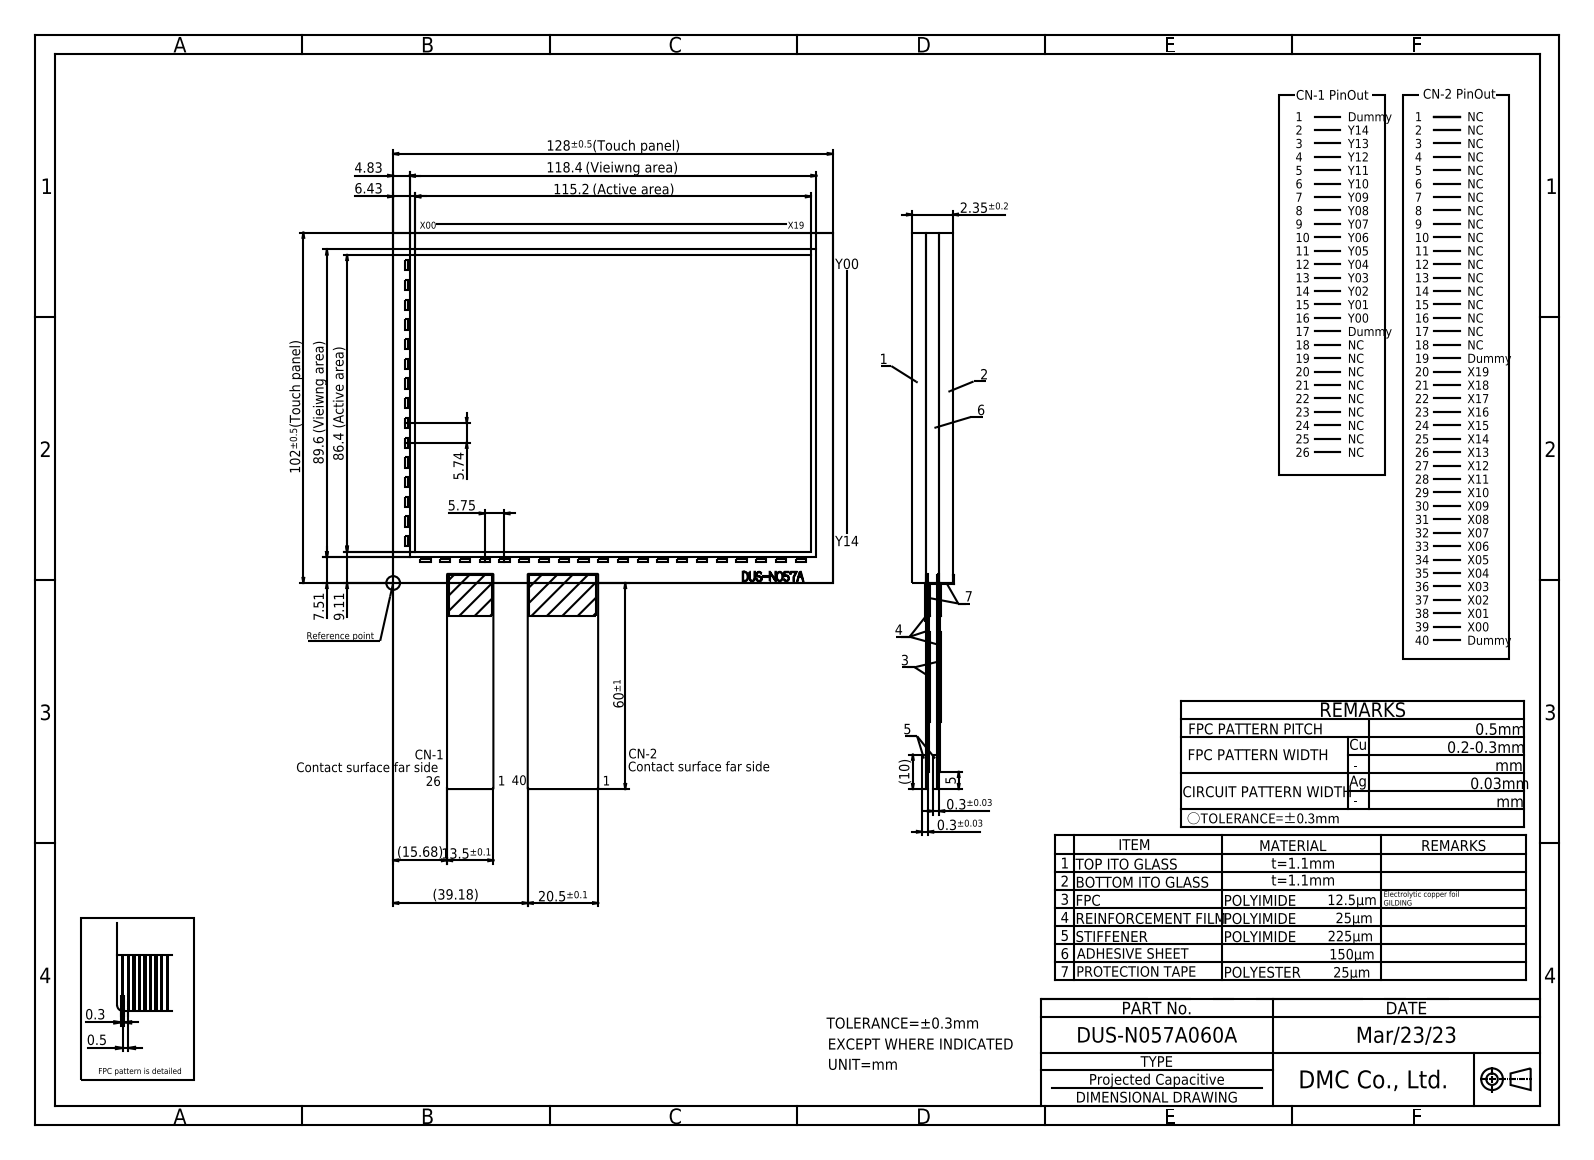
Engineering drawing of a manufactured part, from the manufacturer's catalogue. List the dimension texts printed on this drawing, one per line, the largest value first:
128±0.5(Touch panel)
118.4 (Vieiwng area)
115.2 (Active area)
102±0.5(Touch panel)
89.6 (Vieiwng area)
86.4 (Active area)
60±1
(39.18)
20.5±0.1
(15.68)
13.5±0.1
(10)
9.11
7.51
6.43
5.75
5.74
5
4.83
2.35±0.2
0.5
0.3±0.03
0.3±0.03
0.3
